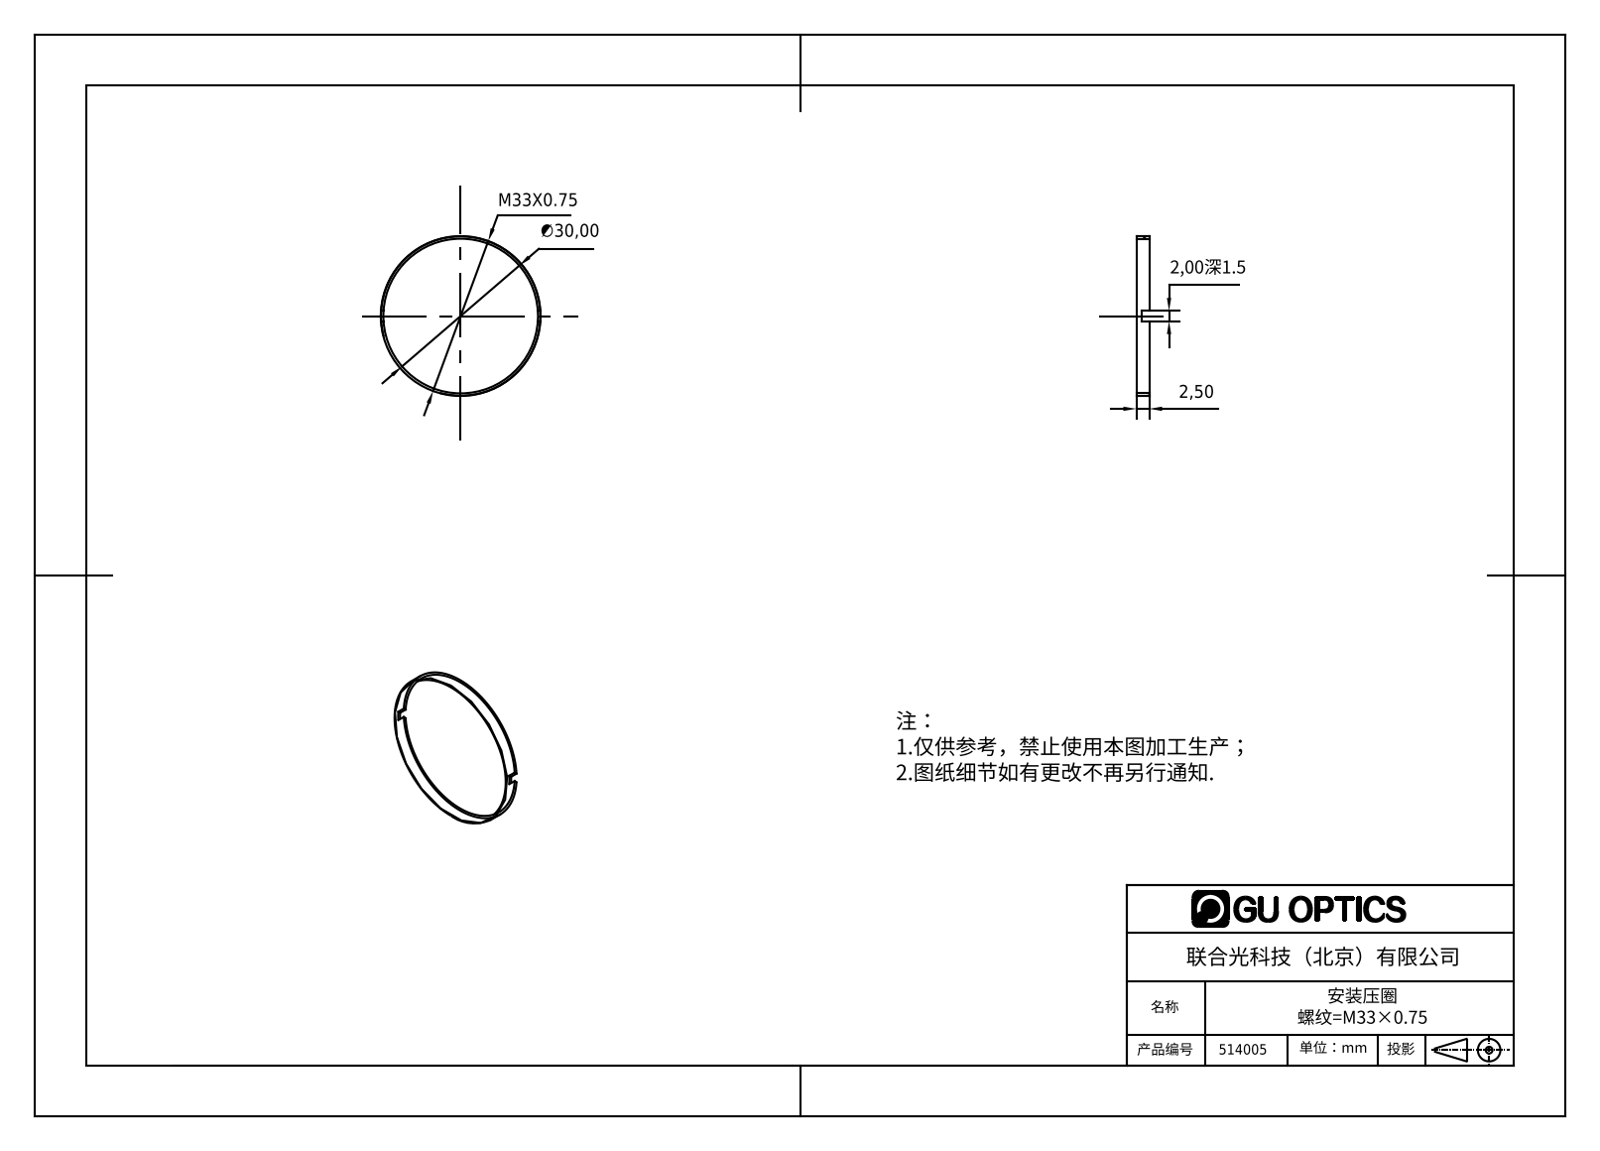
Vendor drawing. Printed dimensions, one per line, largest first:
M33X0.75
∅30,00
2,50
2,00深1.5
